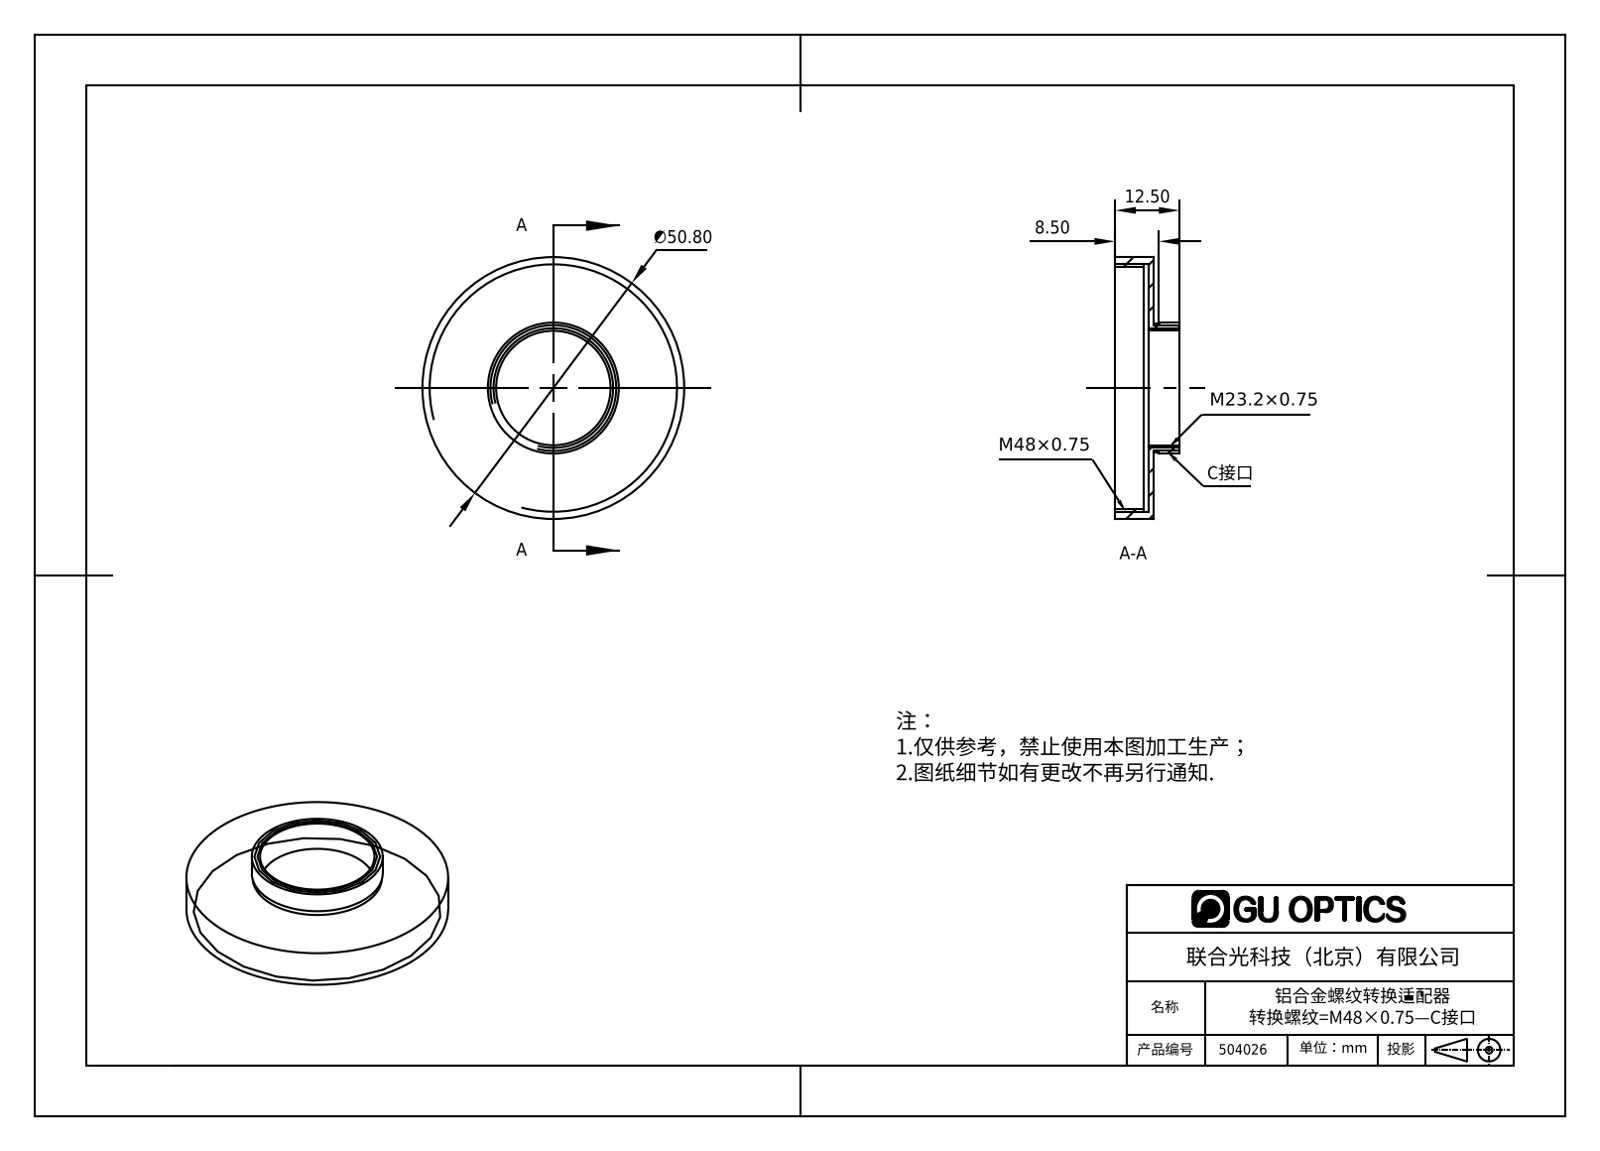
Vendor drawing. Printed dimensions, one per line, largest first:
∅50.80
12.50
8.50
